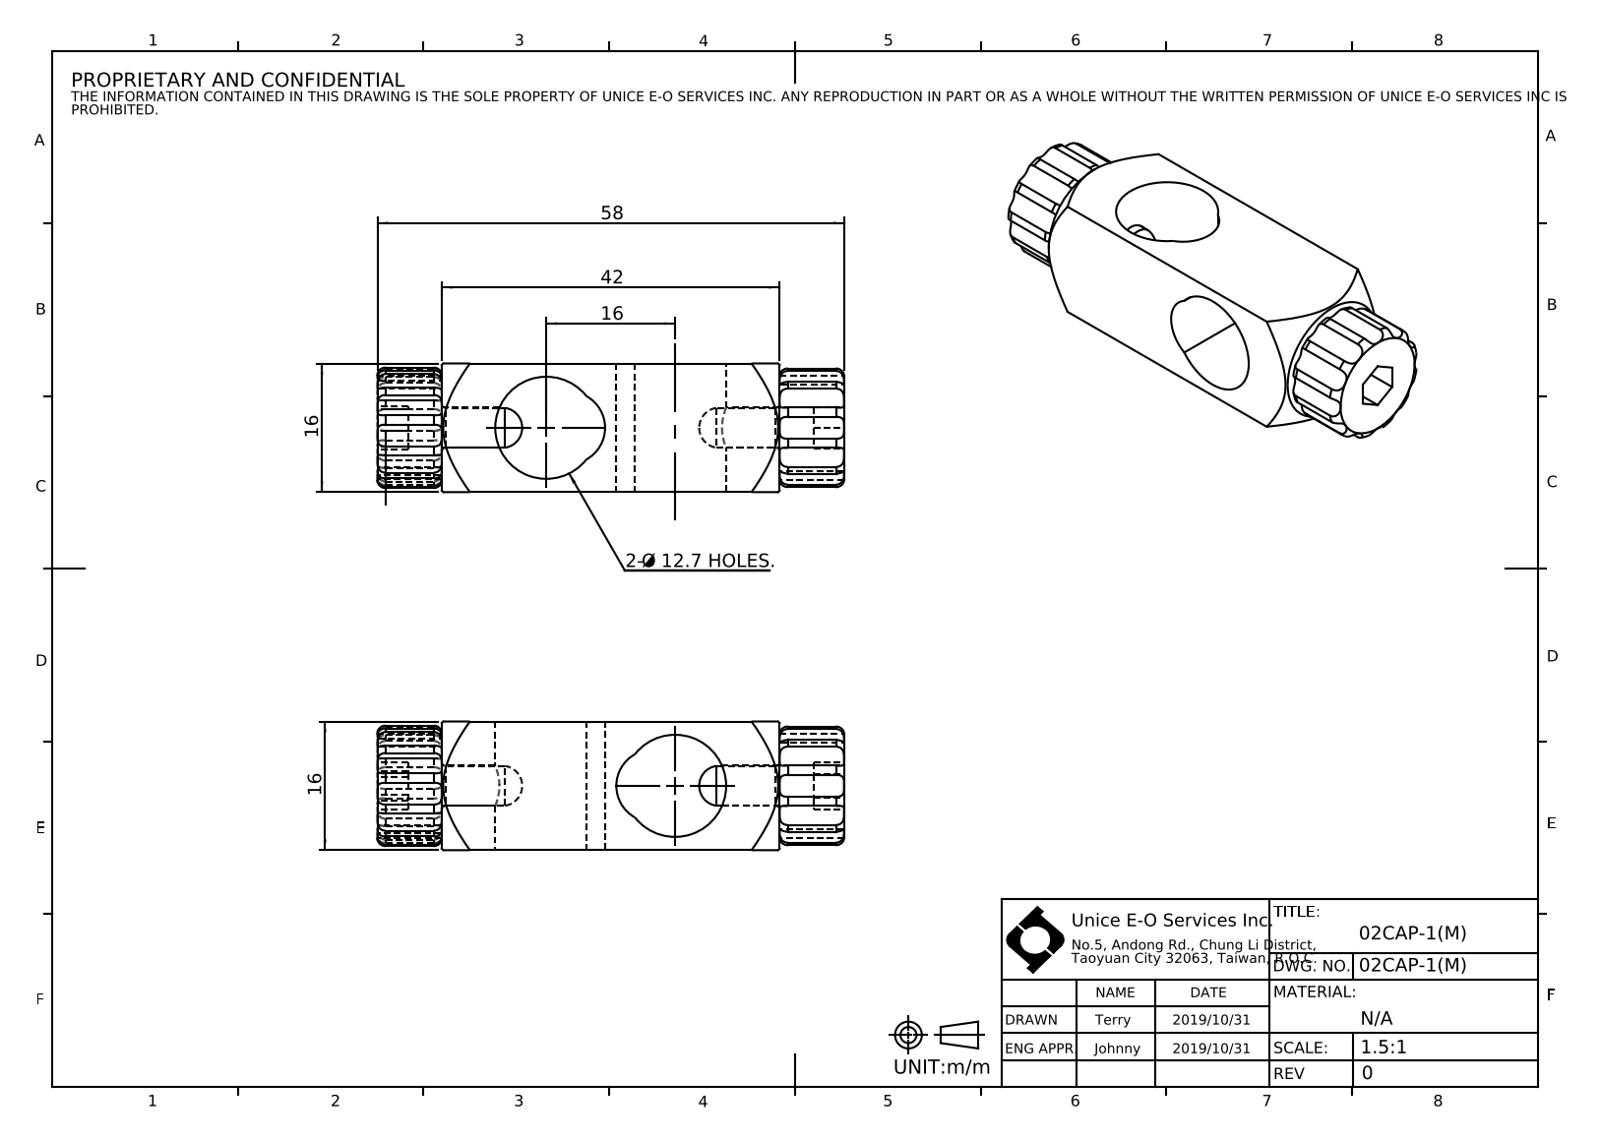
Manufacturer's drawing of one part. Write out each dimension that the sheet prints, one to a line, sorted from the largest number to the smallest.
58
42
16
16
16
